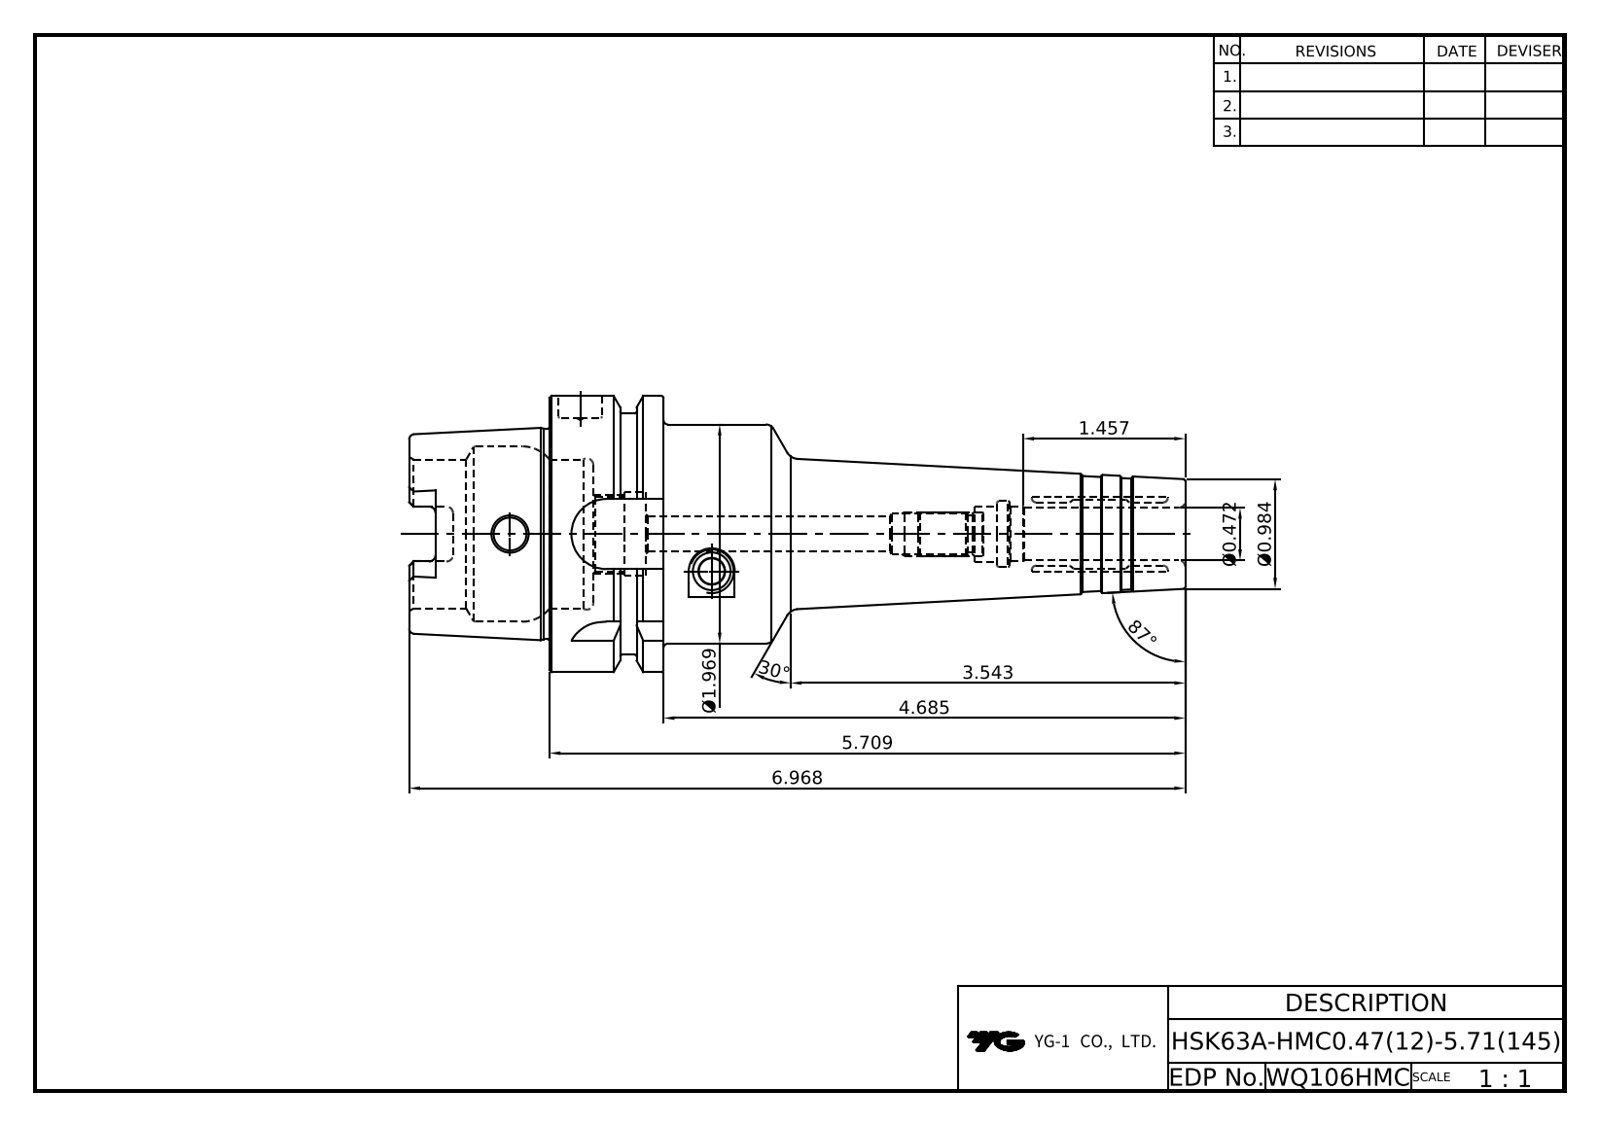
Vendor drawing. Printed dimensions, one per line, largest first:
87°
30°
6.968
5.709
4.685
3.543
Ø1.969
1.457
Ø0.984
Ø0.472
